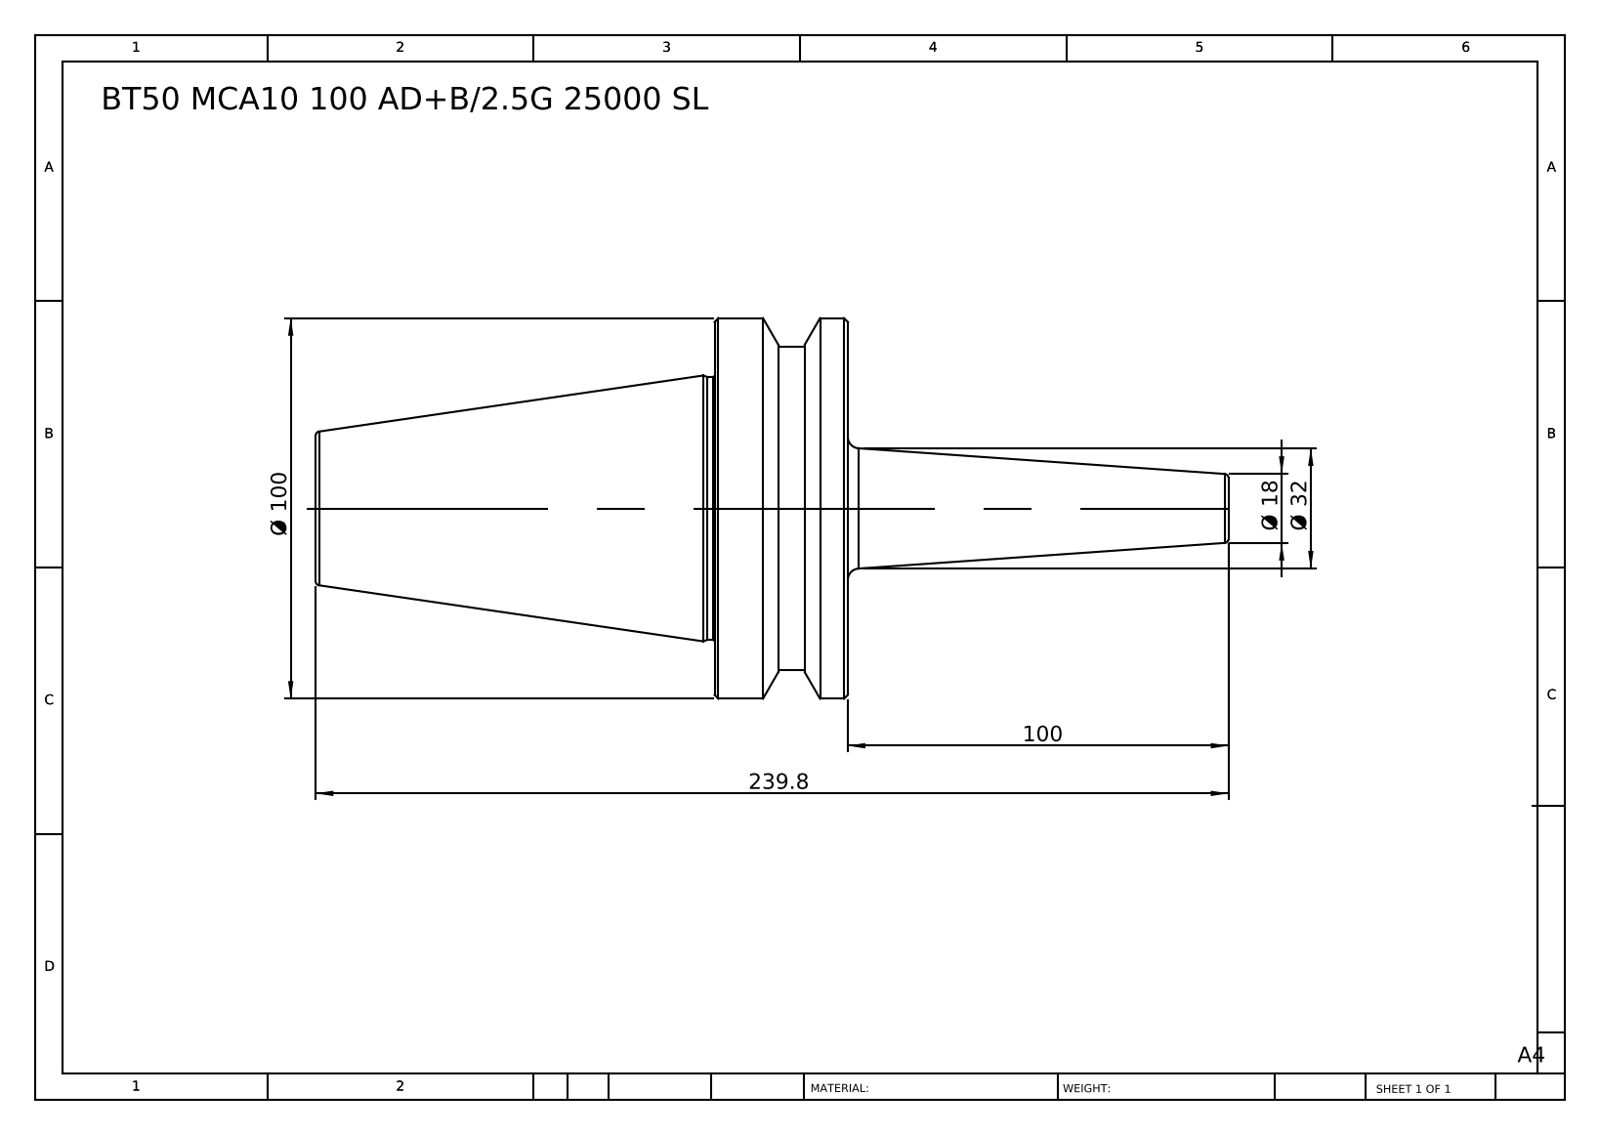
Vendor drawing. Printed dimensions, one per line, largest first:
239.8
Ø 100
100
Ø 32
Ø 18
